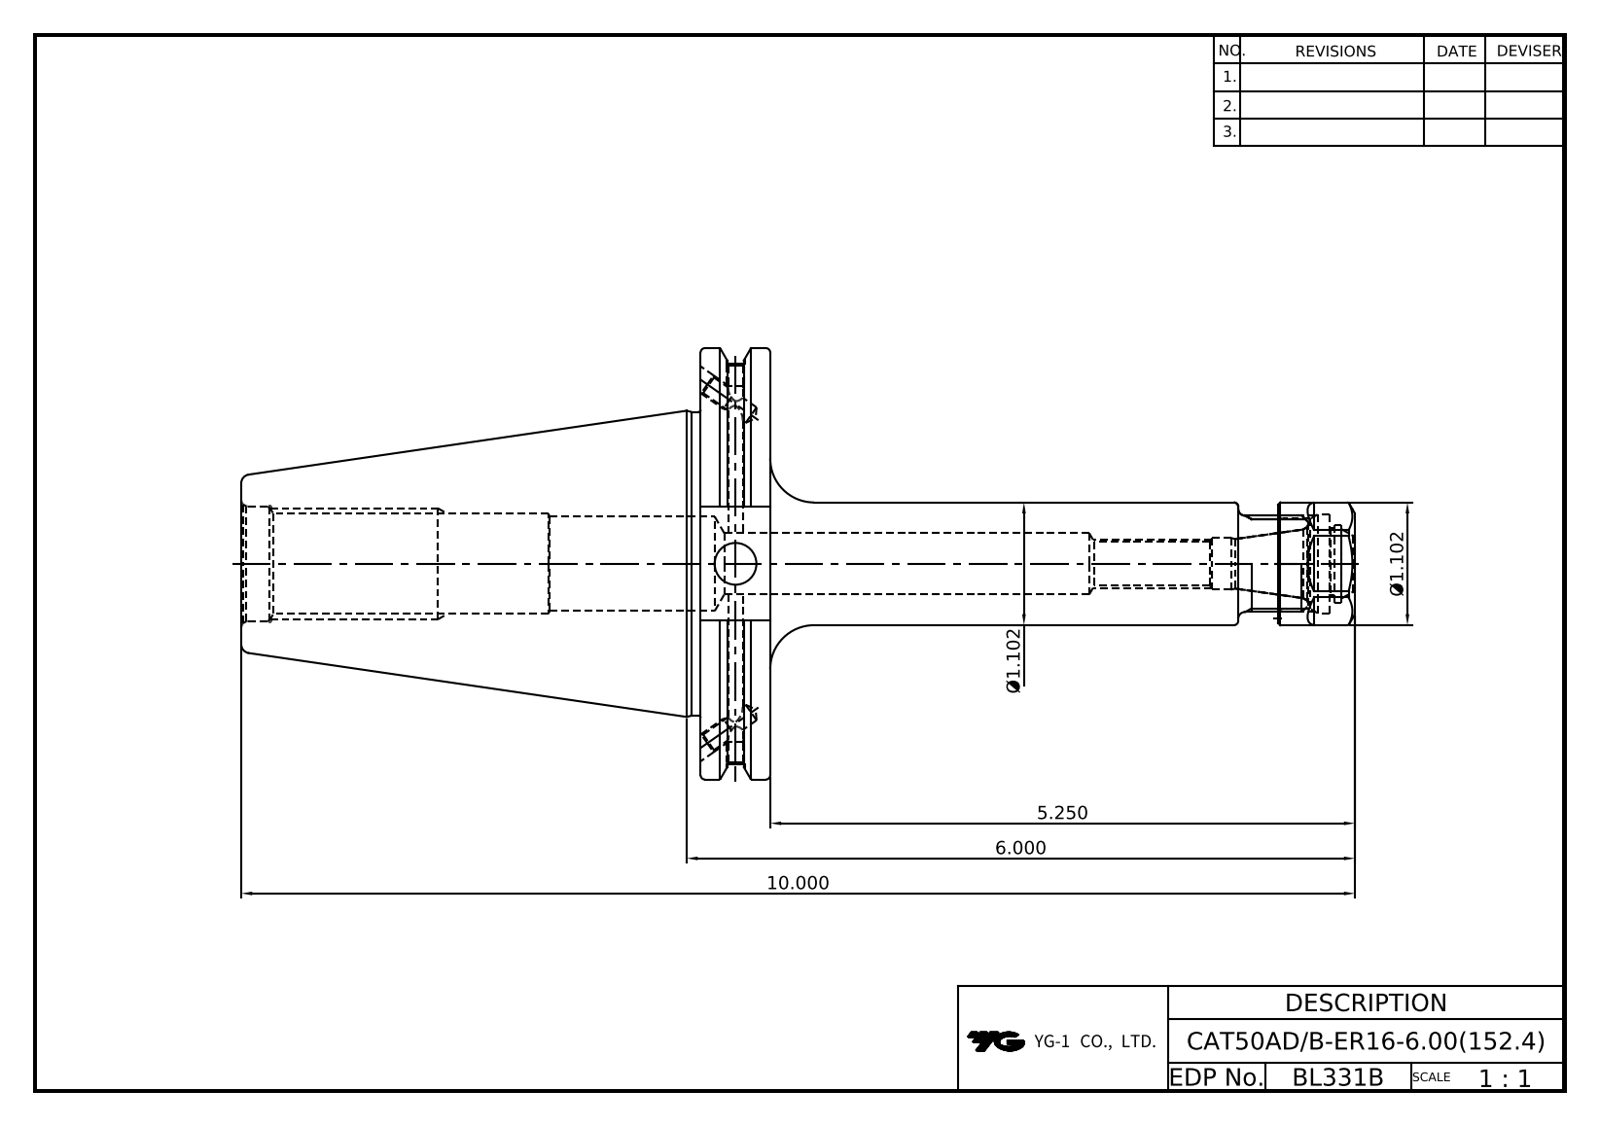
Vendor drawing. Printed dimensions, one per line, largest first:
10.000
6.000
5.250
Ø1.102
Ø1.102
